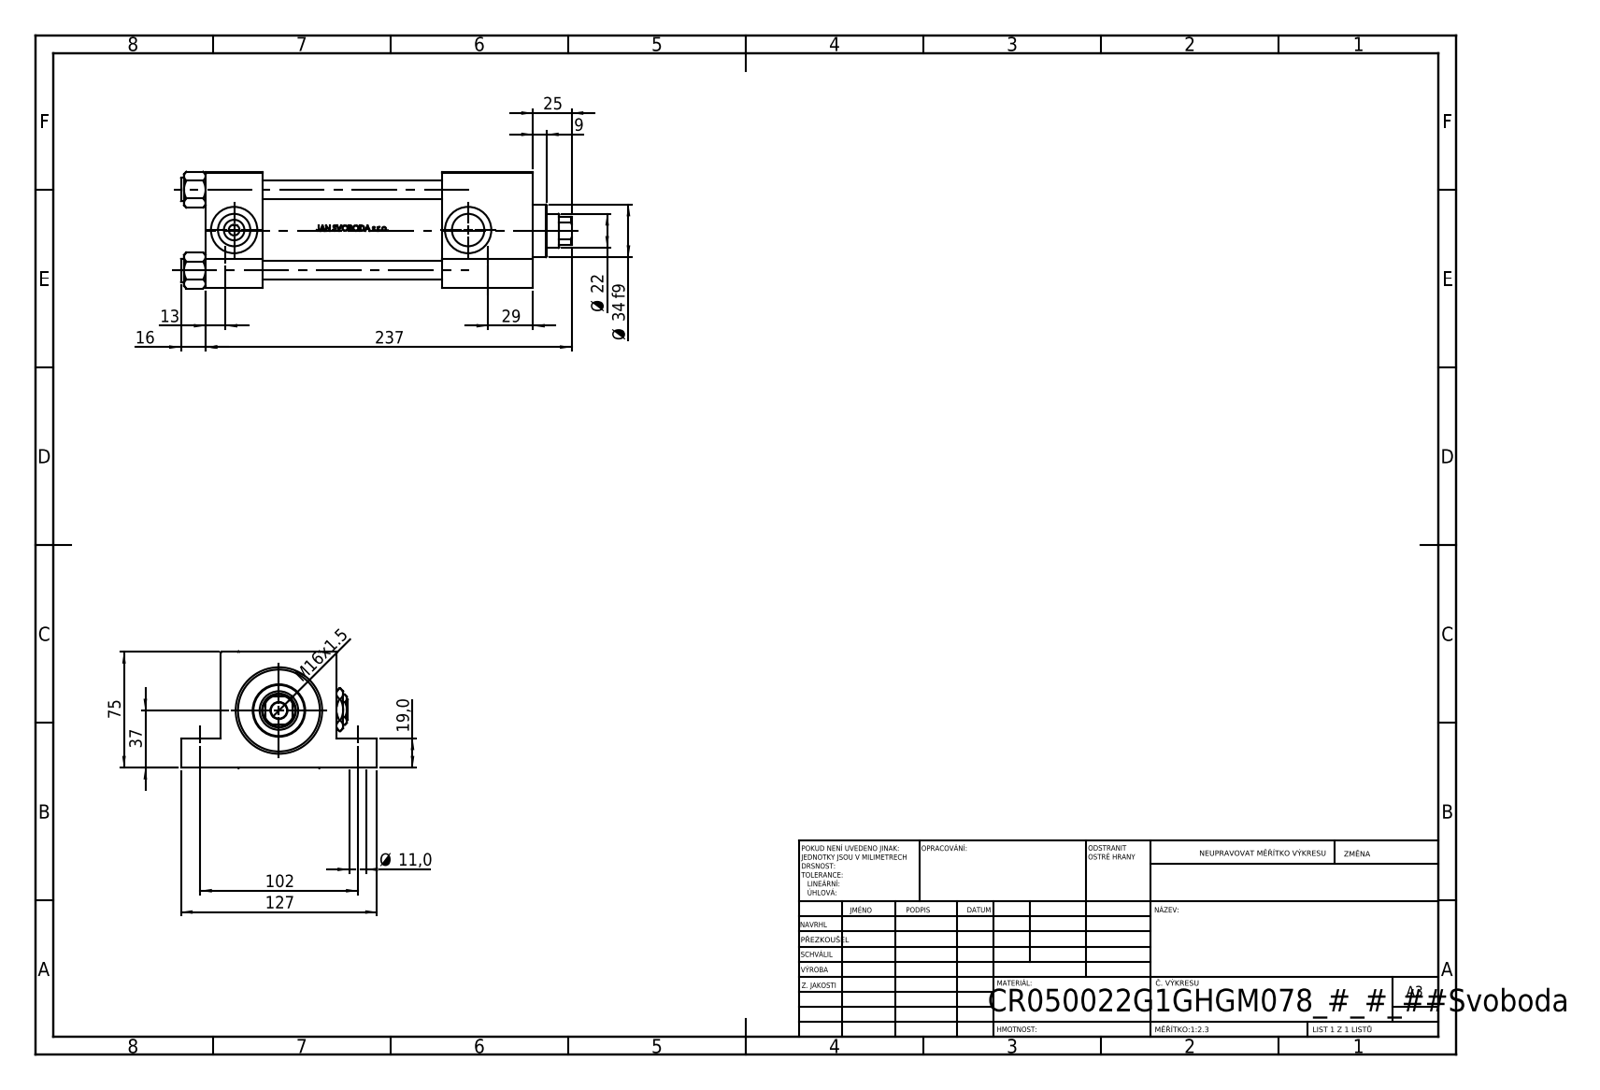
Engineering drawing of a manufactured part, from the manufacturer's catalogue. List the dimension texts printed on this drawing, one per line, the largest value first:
237
127
102
75
37
Ø 34 f9
29
25
Ø 22
19,0
16
M16x1.5
13
Ø 11,0
9
